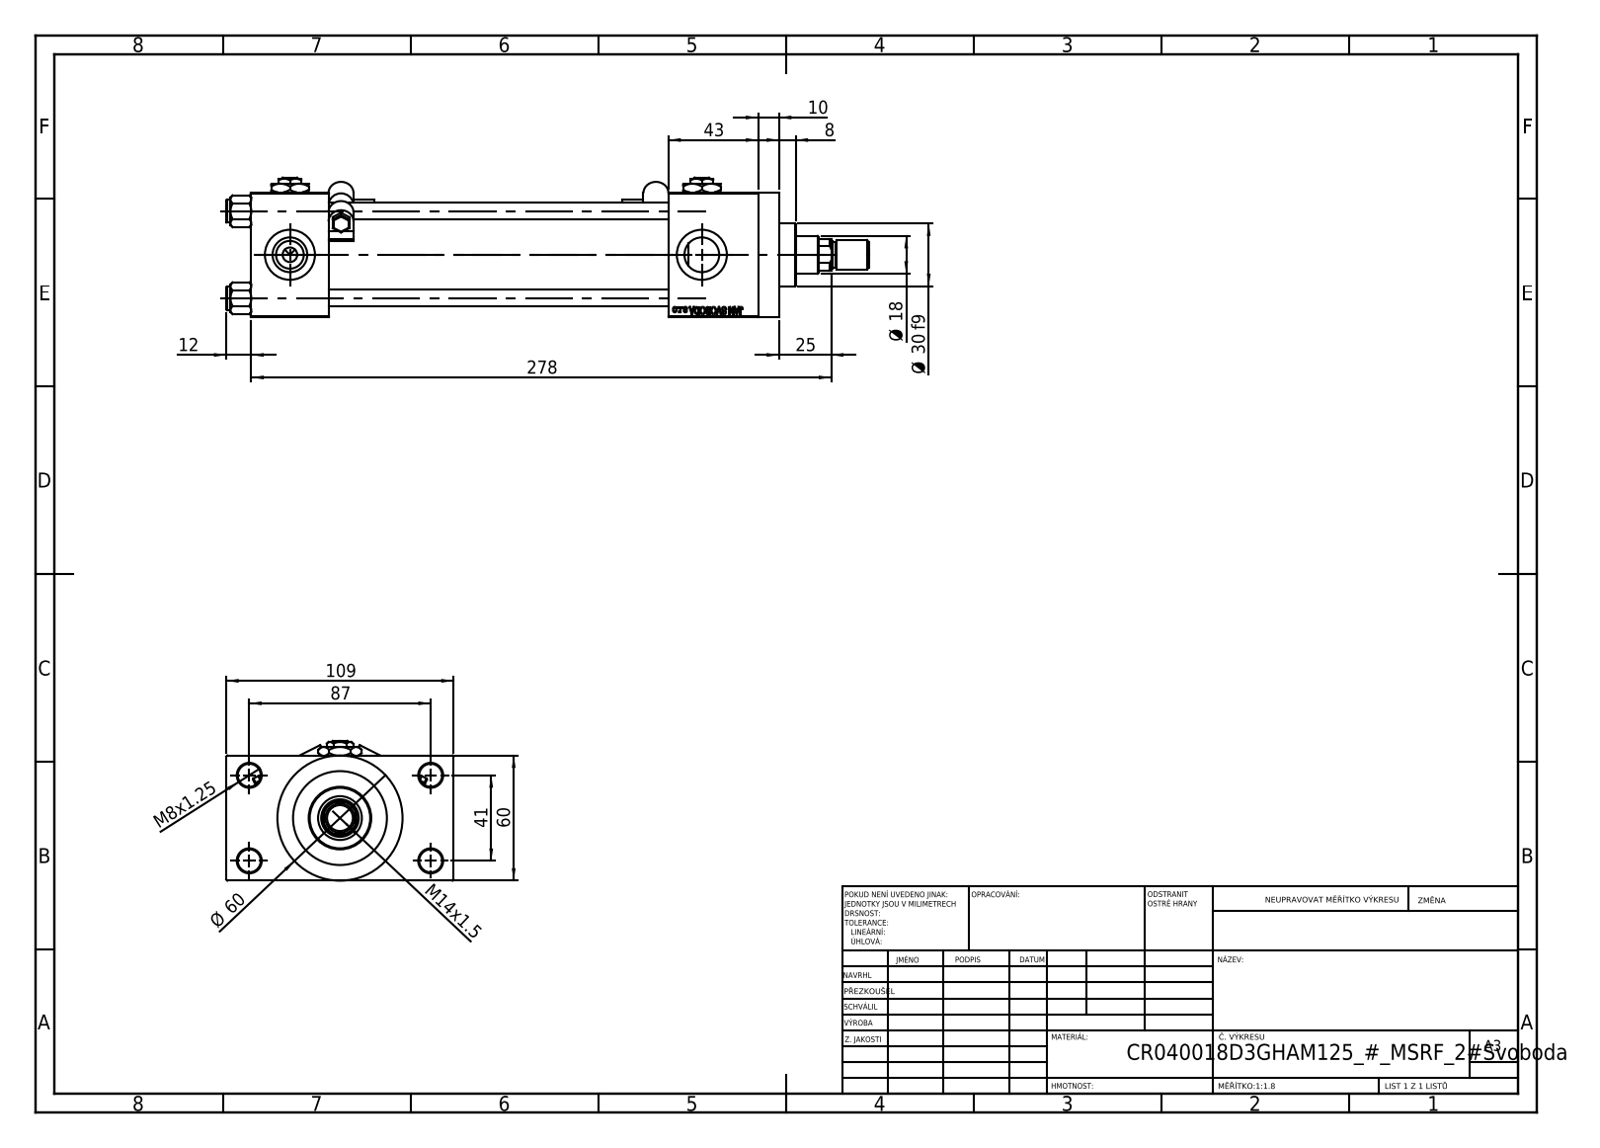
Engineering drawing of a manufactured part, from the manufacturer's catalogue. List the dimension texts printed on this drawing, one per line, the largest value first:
278
109
87
Ø 60
60
43
41
Ø 30 f9
25
Ø 18
M14x1.5
12
10
8
M8x1.25
